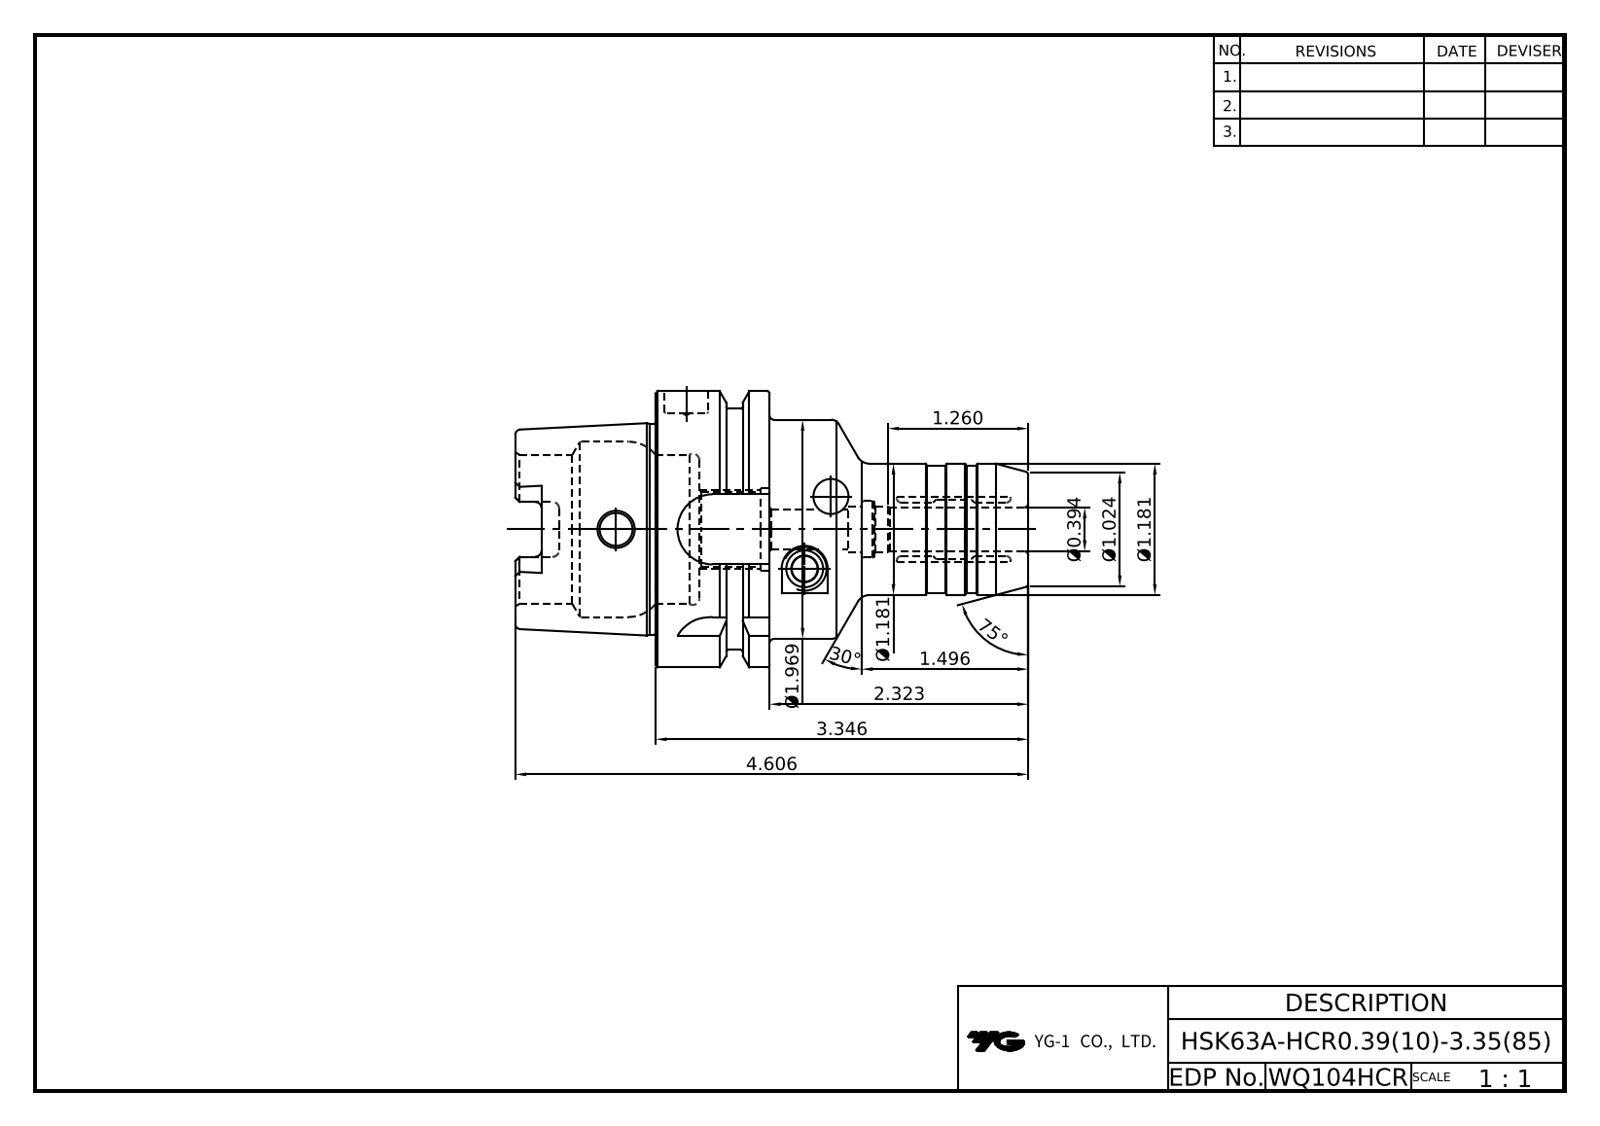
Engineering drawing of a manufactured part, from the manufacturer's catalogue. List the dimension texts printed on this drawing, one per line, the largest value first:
75°
30°
4.606
3.346
2.323
Ø1.969
1.496
1.260
Ø1.181
Ø1.181
Ø1.024
Ø0.394
